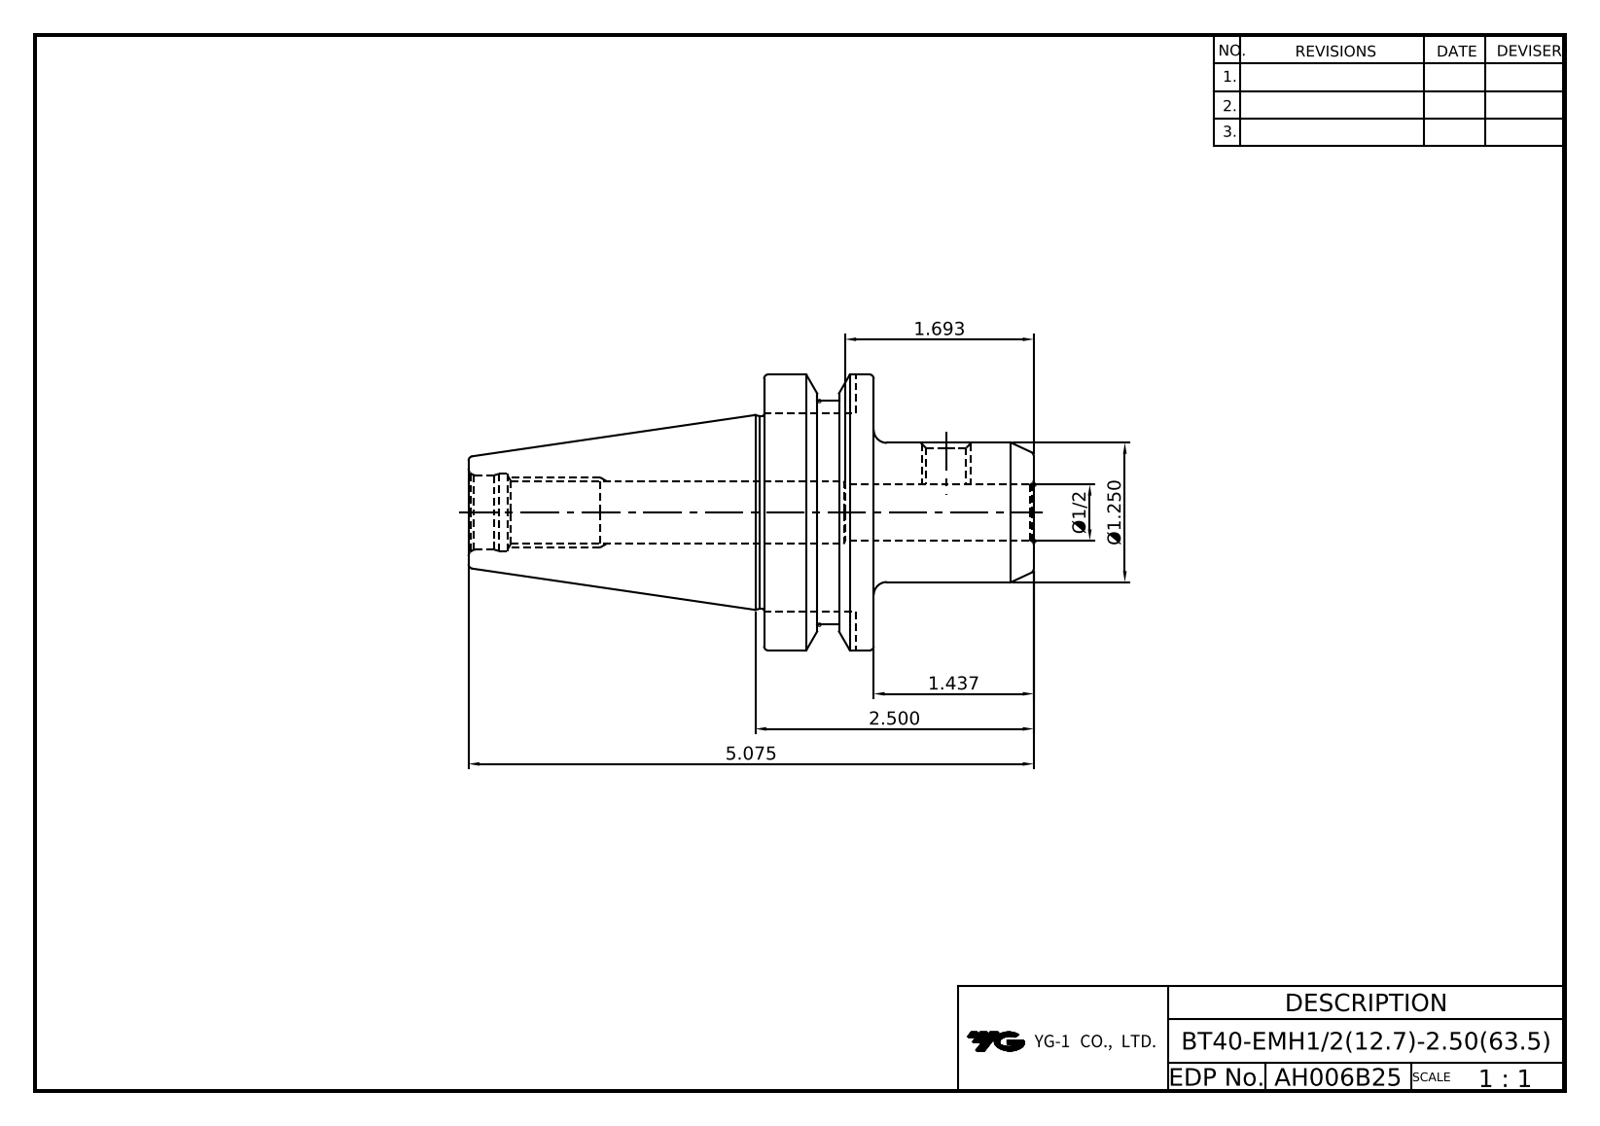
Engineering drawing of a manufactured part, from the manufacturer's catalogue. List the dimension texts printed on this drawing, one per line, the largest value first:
5.075
2.500
1.693
1.437
Ø1.250
Ø1/2
